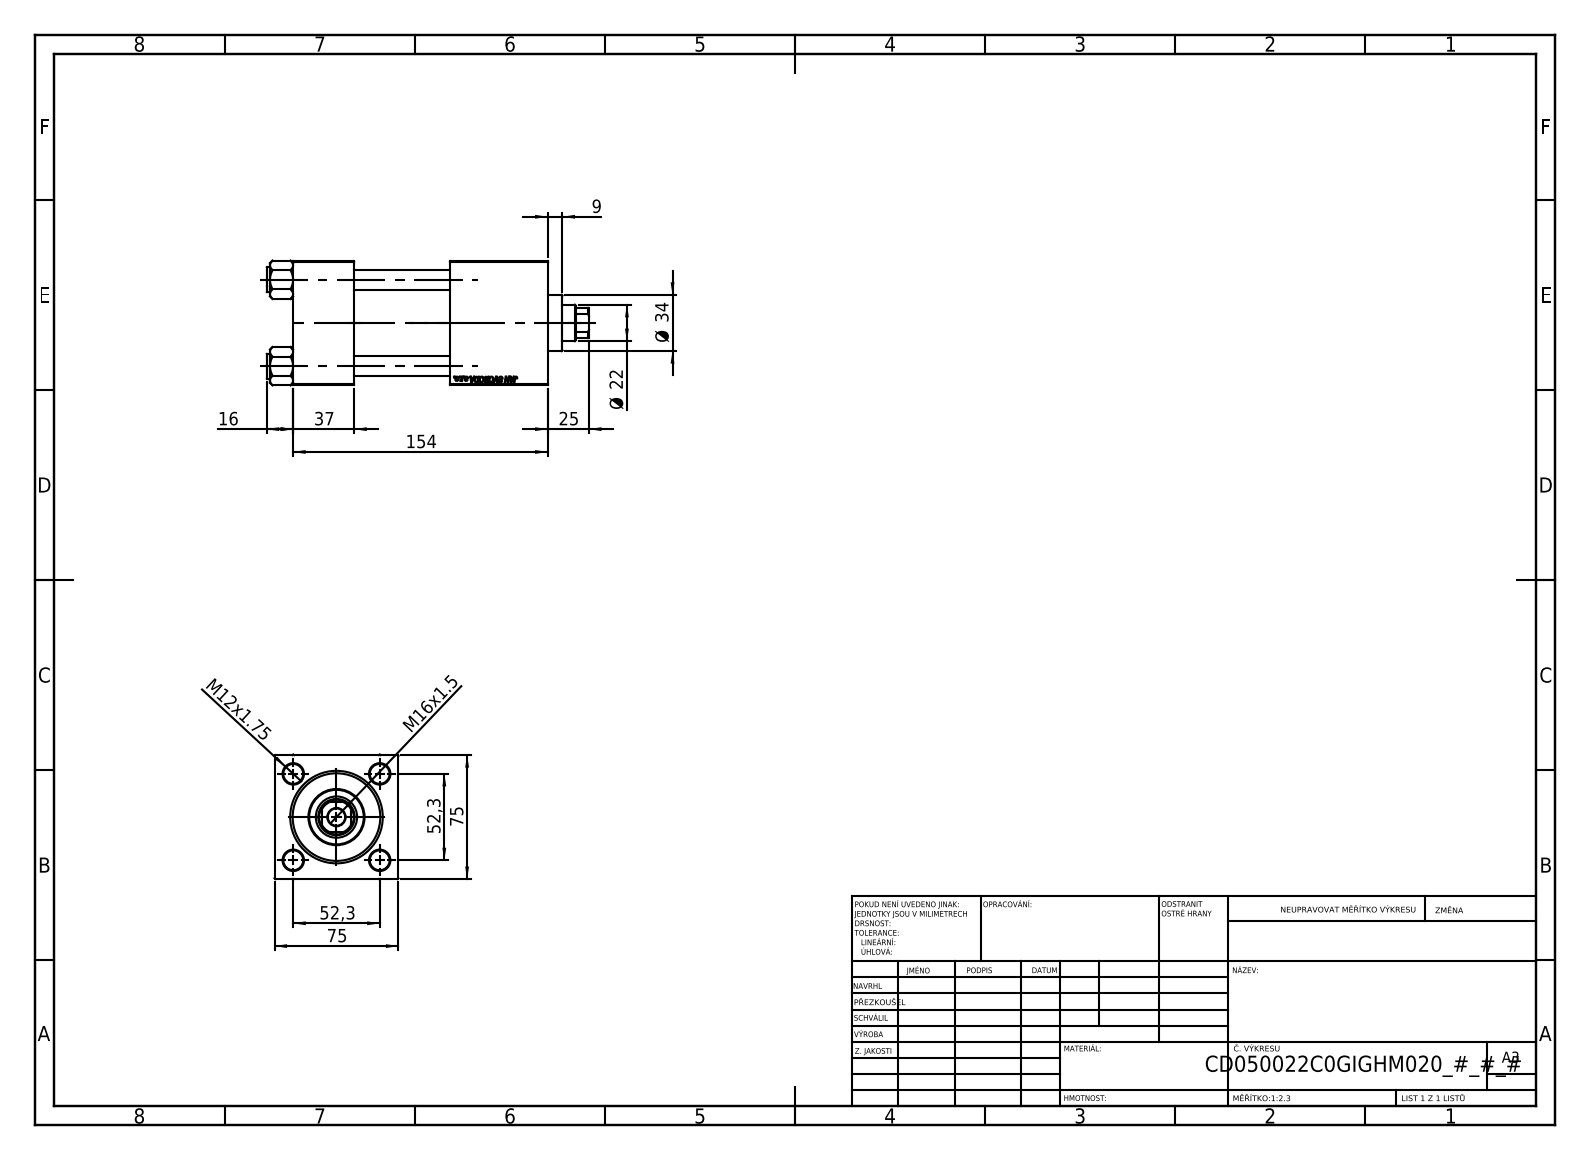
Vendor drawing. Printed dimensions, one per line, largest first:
154
75
75
52,3
52,3
37
Ø 34
25
Ø 22
16
M16x1.5
M12x1.75
9
